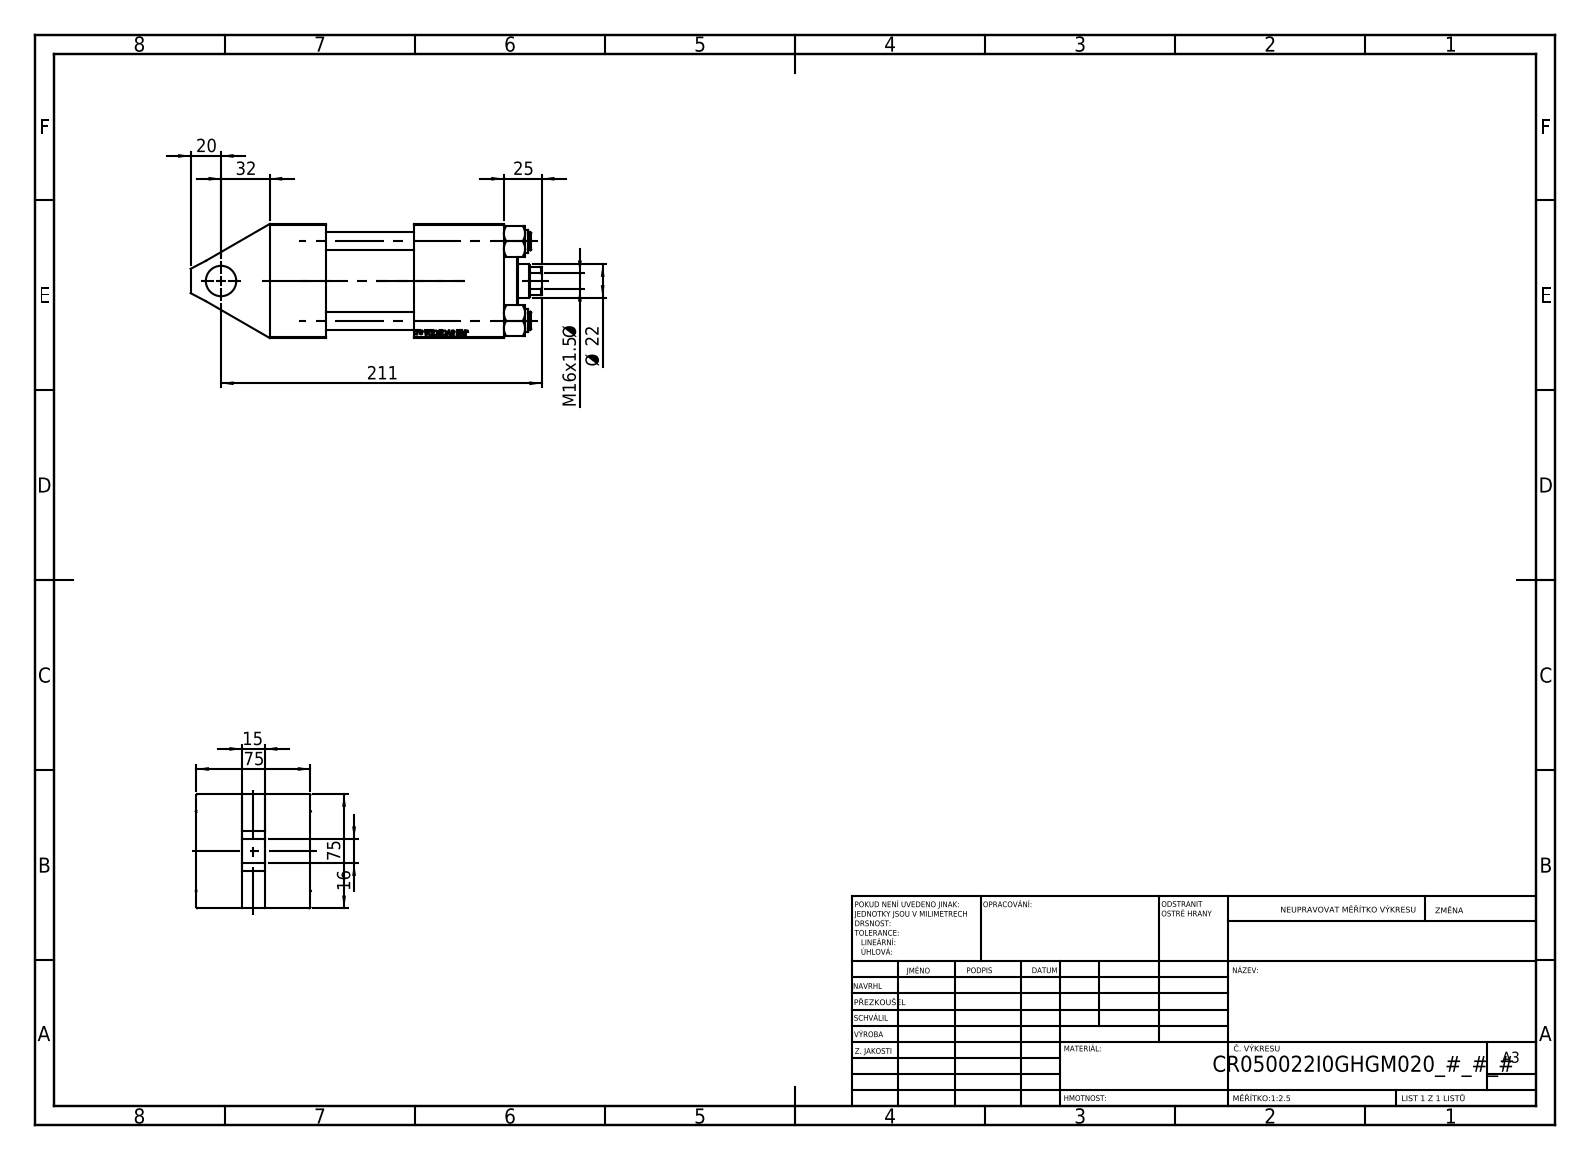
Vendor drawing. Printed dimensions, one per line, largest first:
211
75
75
32
25
Ø 22
20
M16x1.5 Ø
16
15
